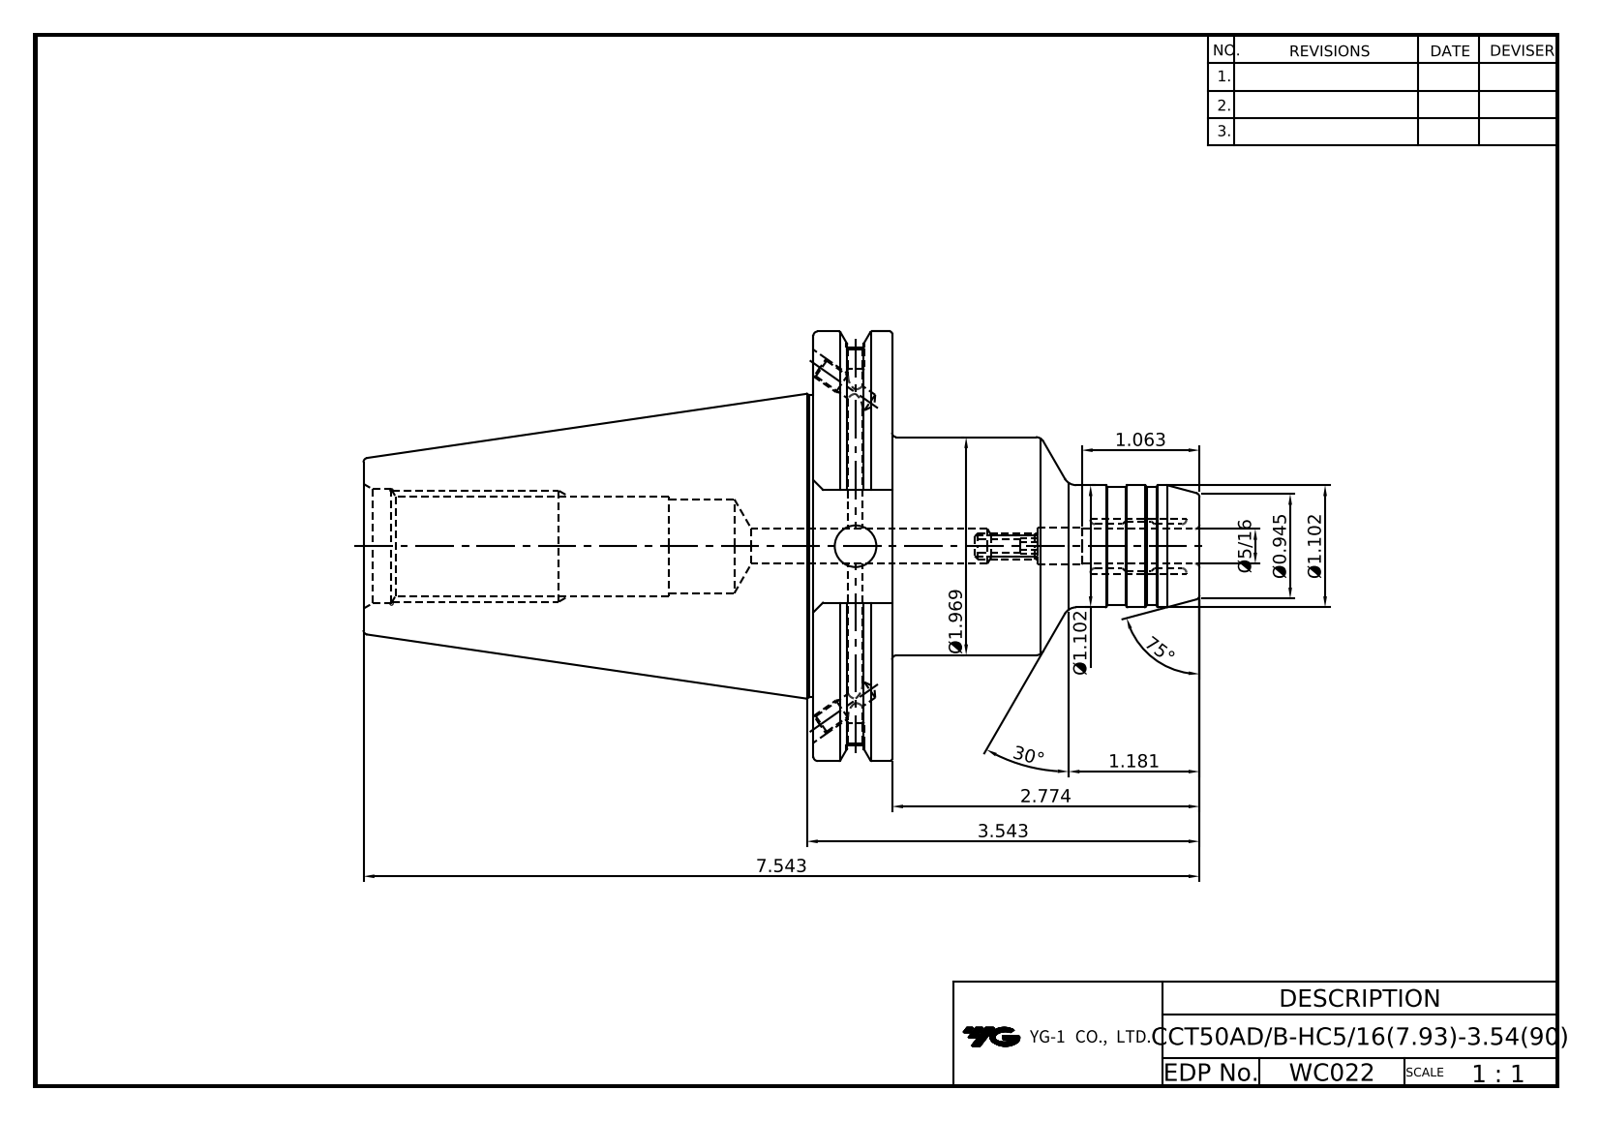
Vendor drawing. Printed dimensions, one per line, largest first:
75°
30°
7.543
3.543
2.774
Ø1.969
1.181
Ø1.102
Ø1.102
1.063
Ø0.945
Ø5/16
